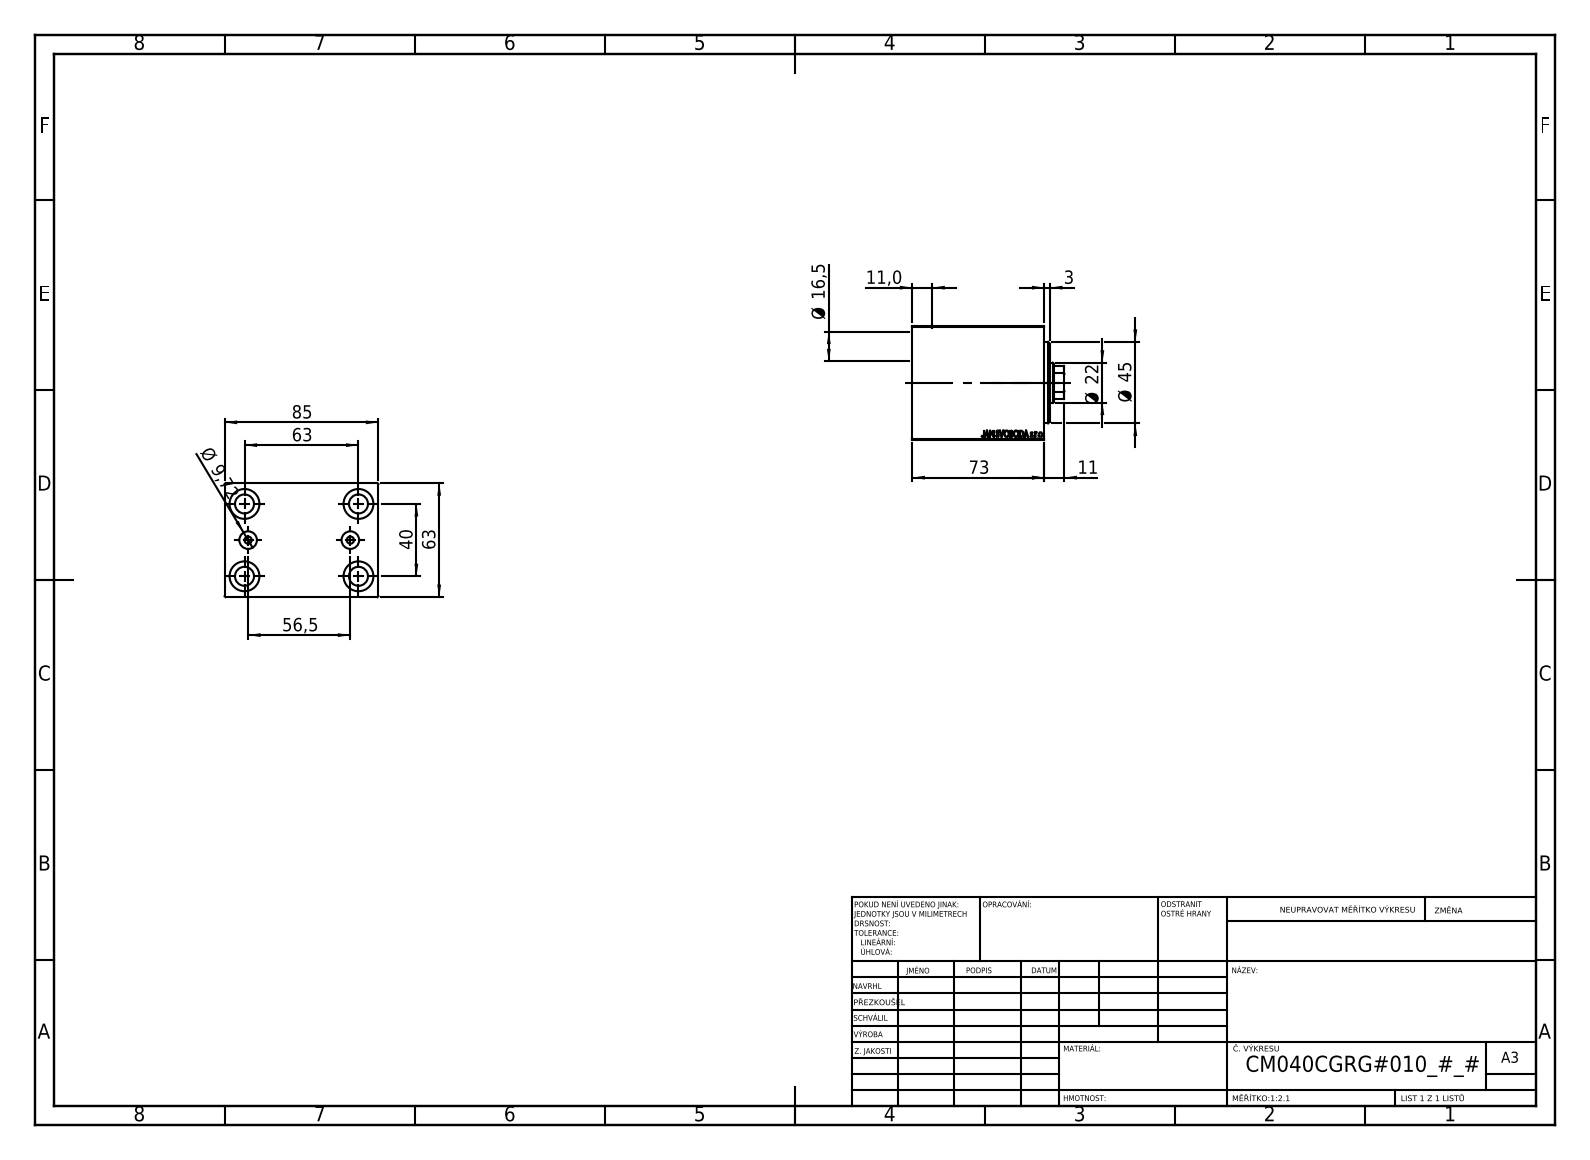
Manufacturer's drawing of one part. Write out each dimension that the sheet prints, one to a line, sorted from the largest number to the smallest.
85
73
63
63
56,5
Ø 45
40
Ø 22
Ø 16,5
11
11,0
Ø 9,72
3
